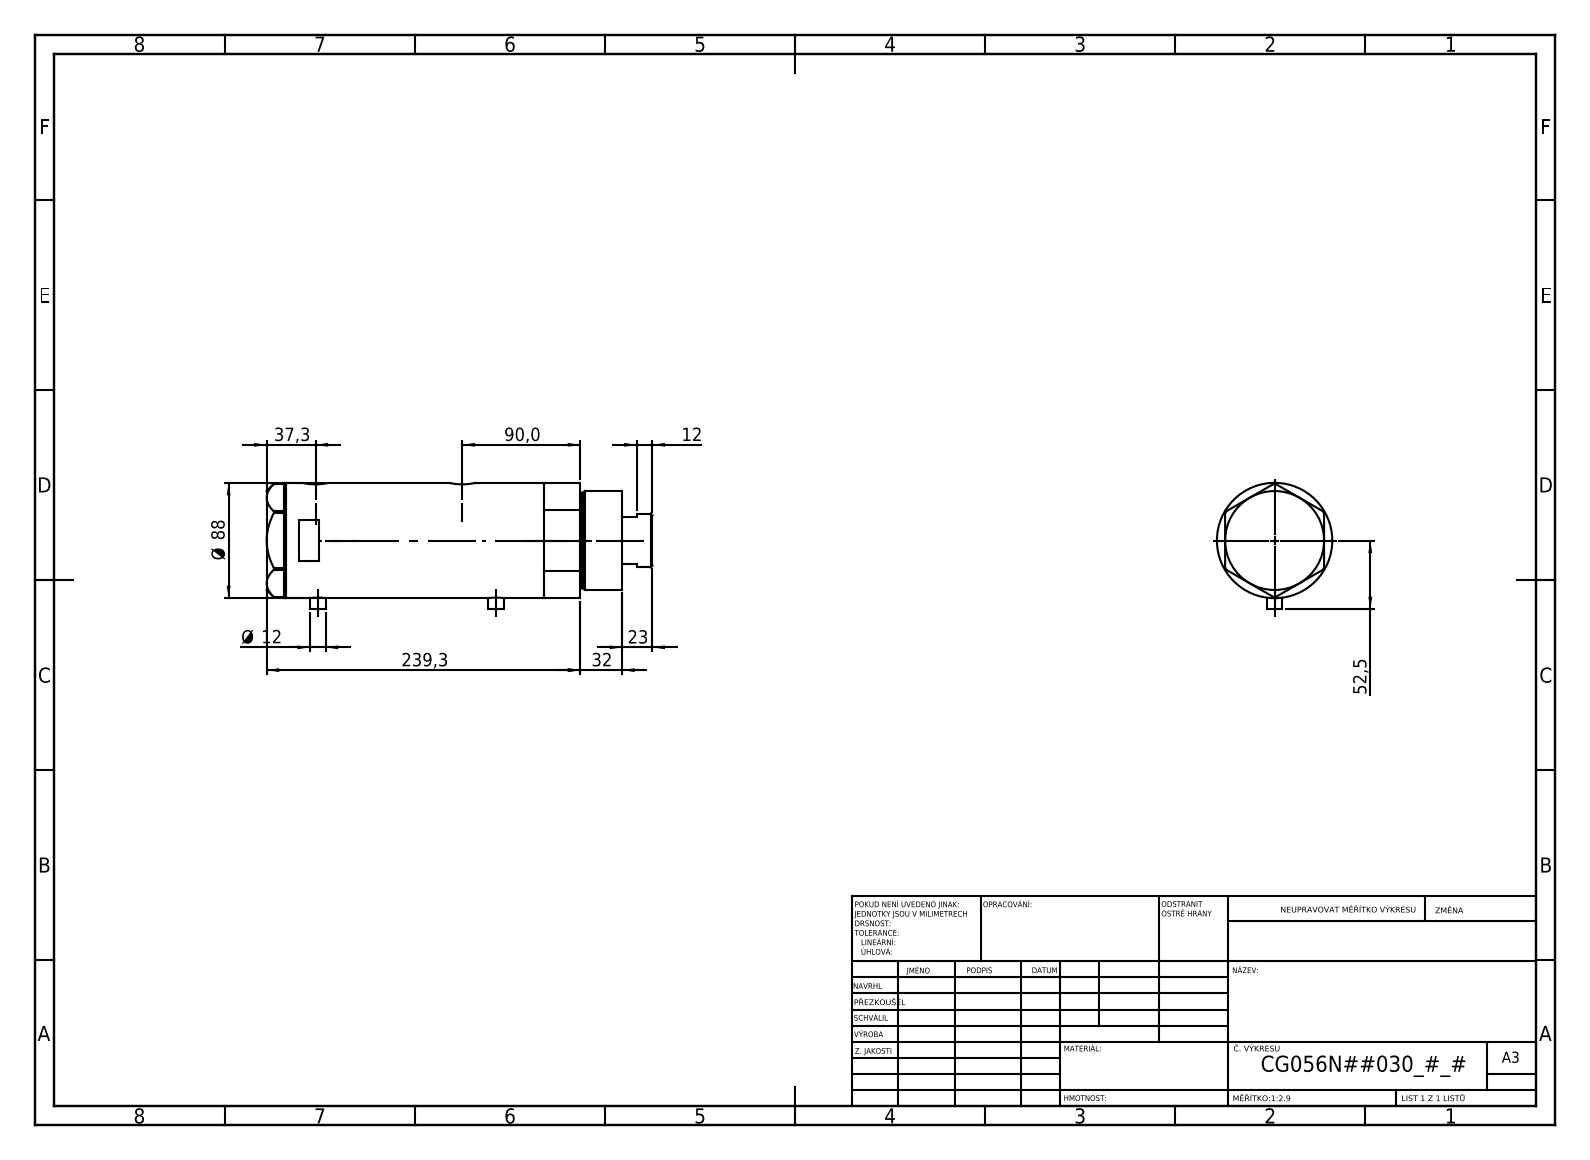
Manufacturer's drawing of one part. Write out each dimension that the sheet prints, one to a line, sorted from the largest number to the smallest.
239,3
90,0
Ø 88
52,5
37,3
32
23
12
Ø 12
